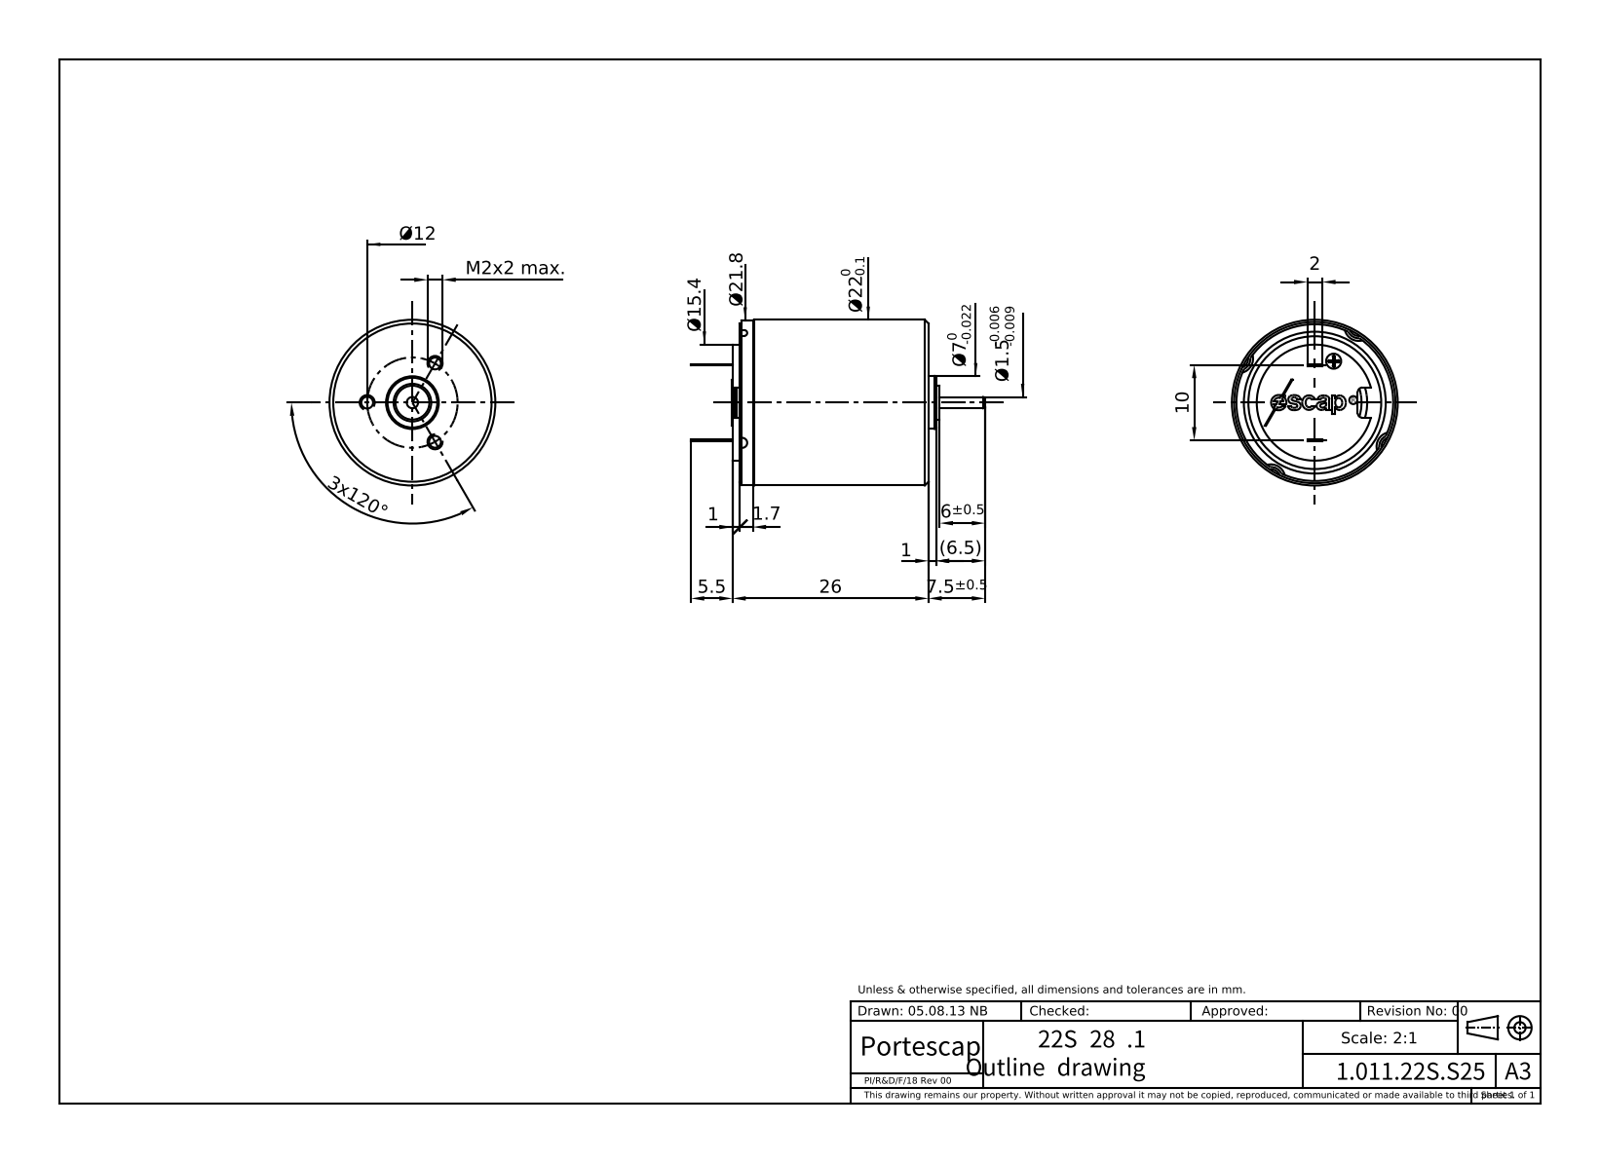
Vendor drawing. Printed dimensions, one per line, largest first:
3x120°
26
10
7.5±0.5
(6.5)
6±0.5
5.5
2
M2x2 max.
1.7
1
1
